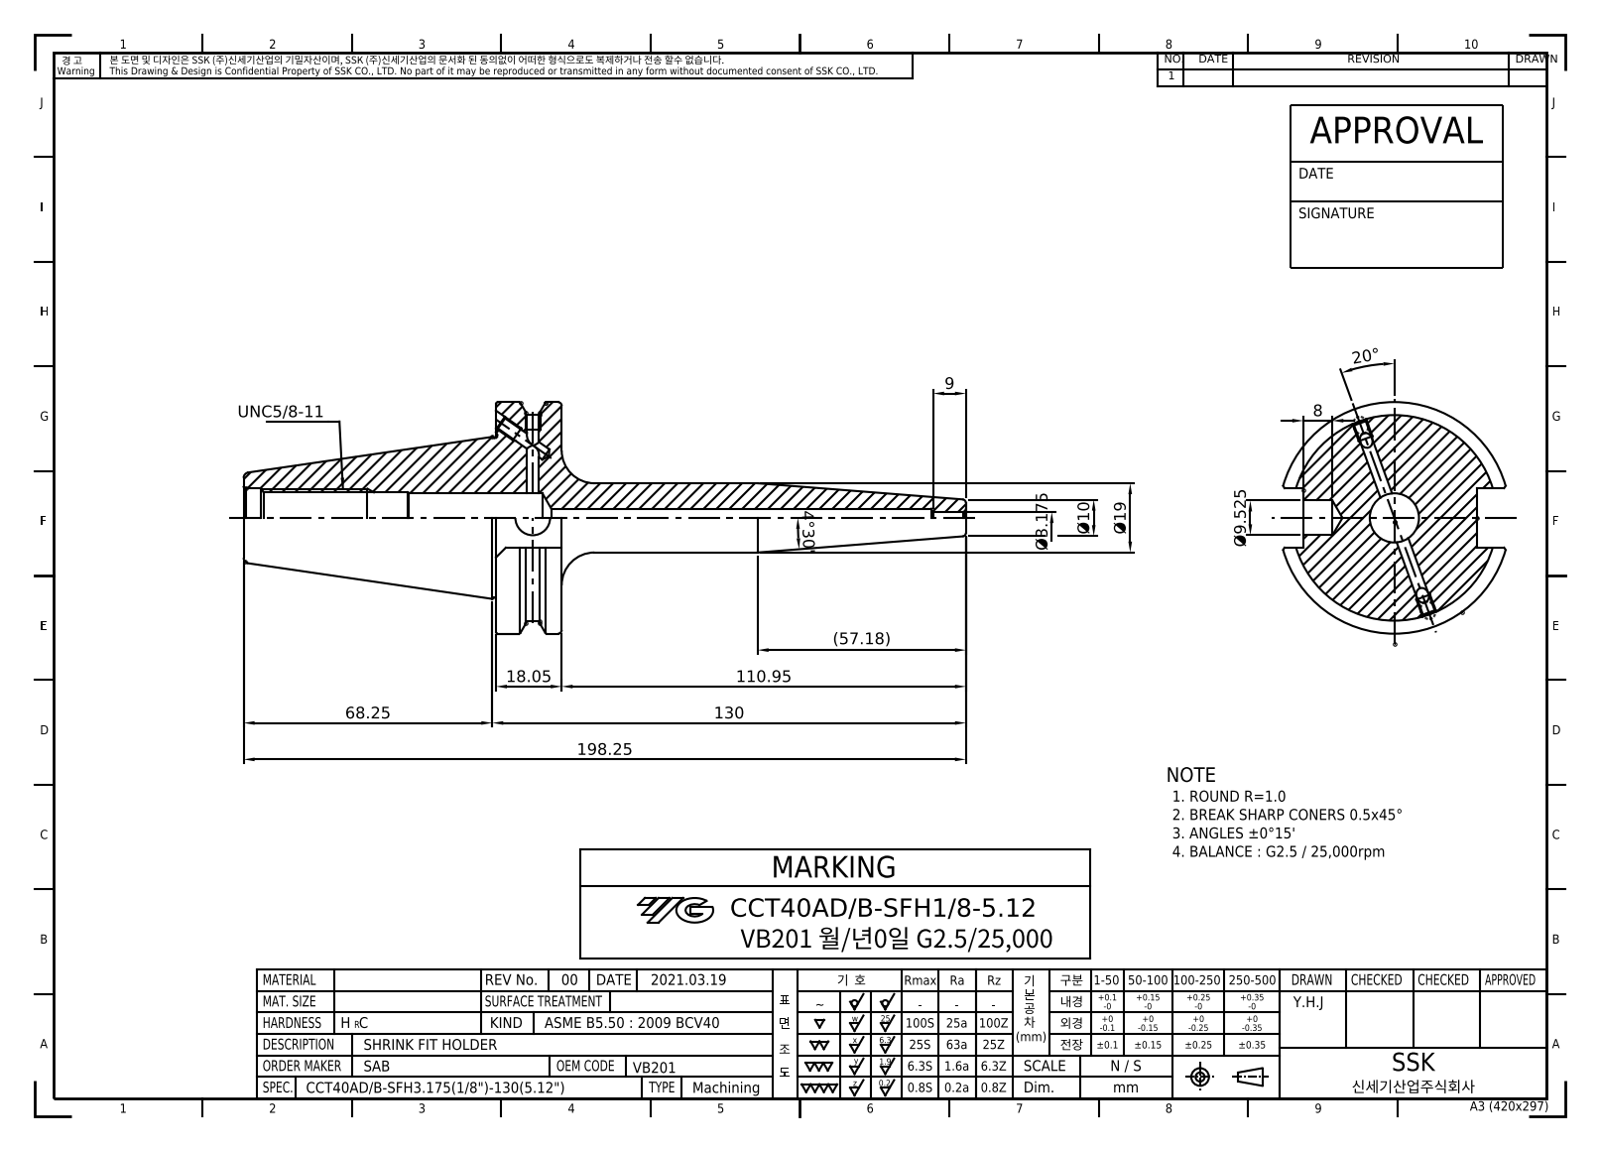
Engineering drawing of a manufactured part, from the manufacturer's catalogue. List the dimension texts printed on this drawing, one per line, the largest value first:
198.25
130
110.95
68.25
(57.18)
20°
Ø19
18.05
Ø10
Ø9.525
9
8
4°30'
Ø3.175
